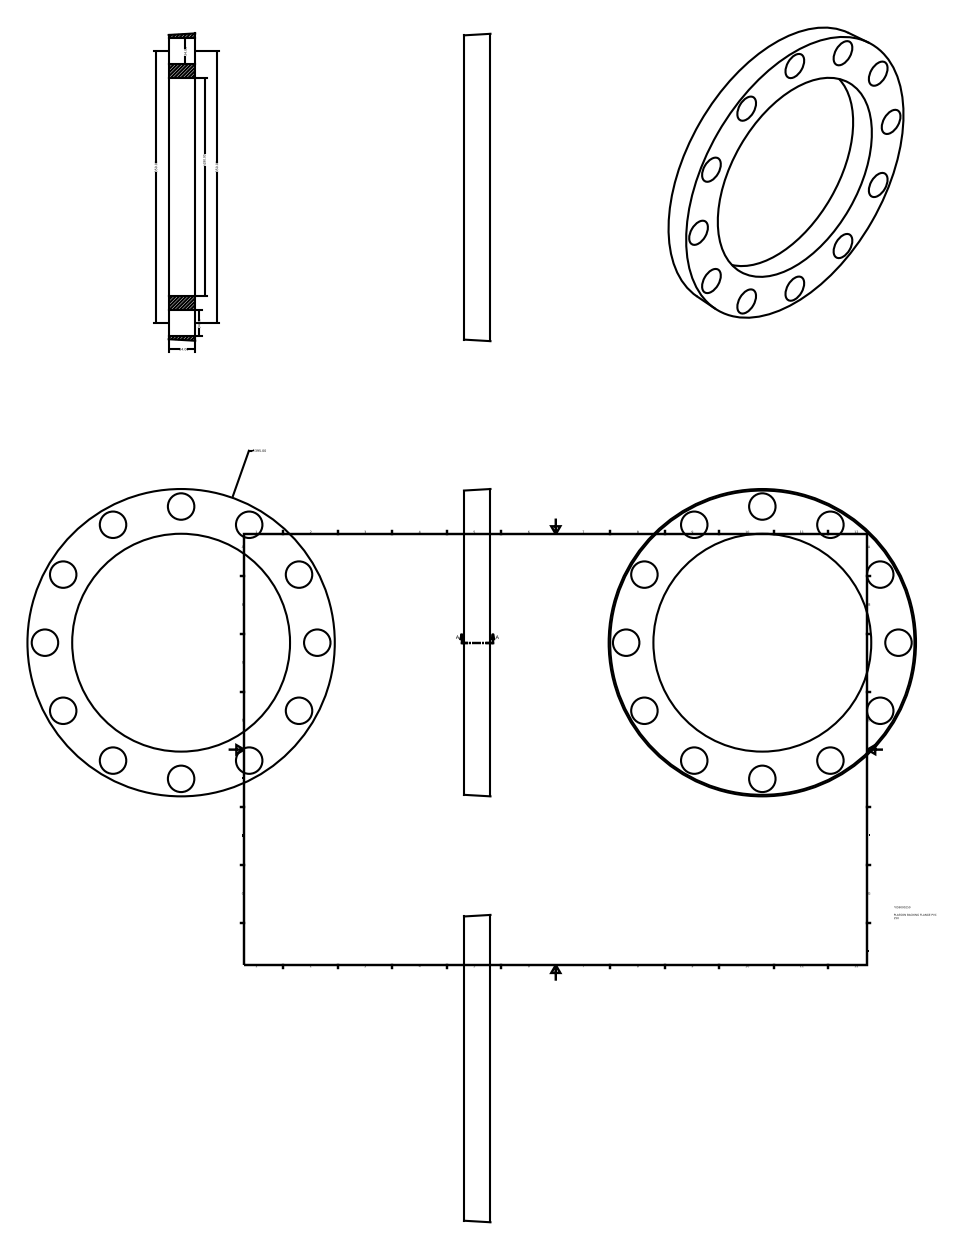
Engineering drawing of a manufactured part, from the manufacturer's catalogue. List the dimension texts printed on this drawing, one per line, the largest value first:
∅395.00
350.00
350.00
n280.00
34.00
34.00
34.00
